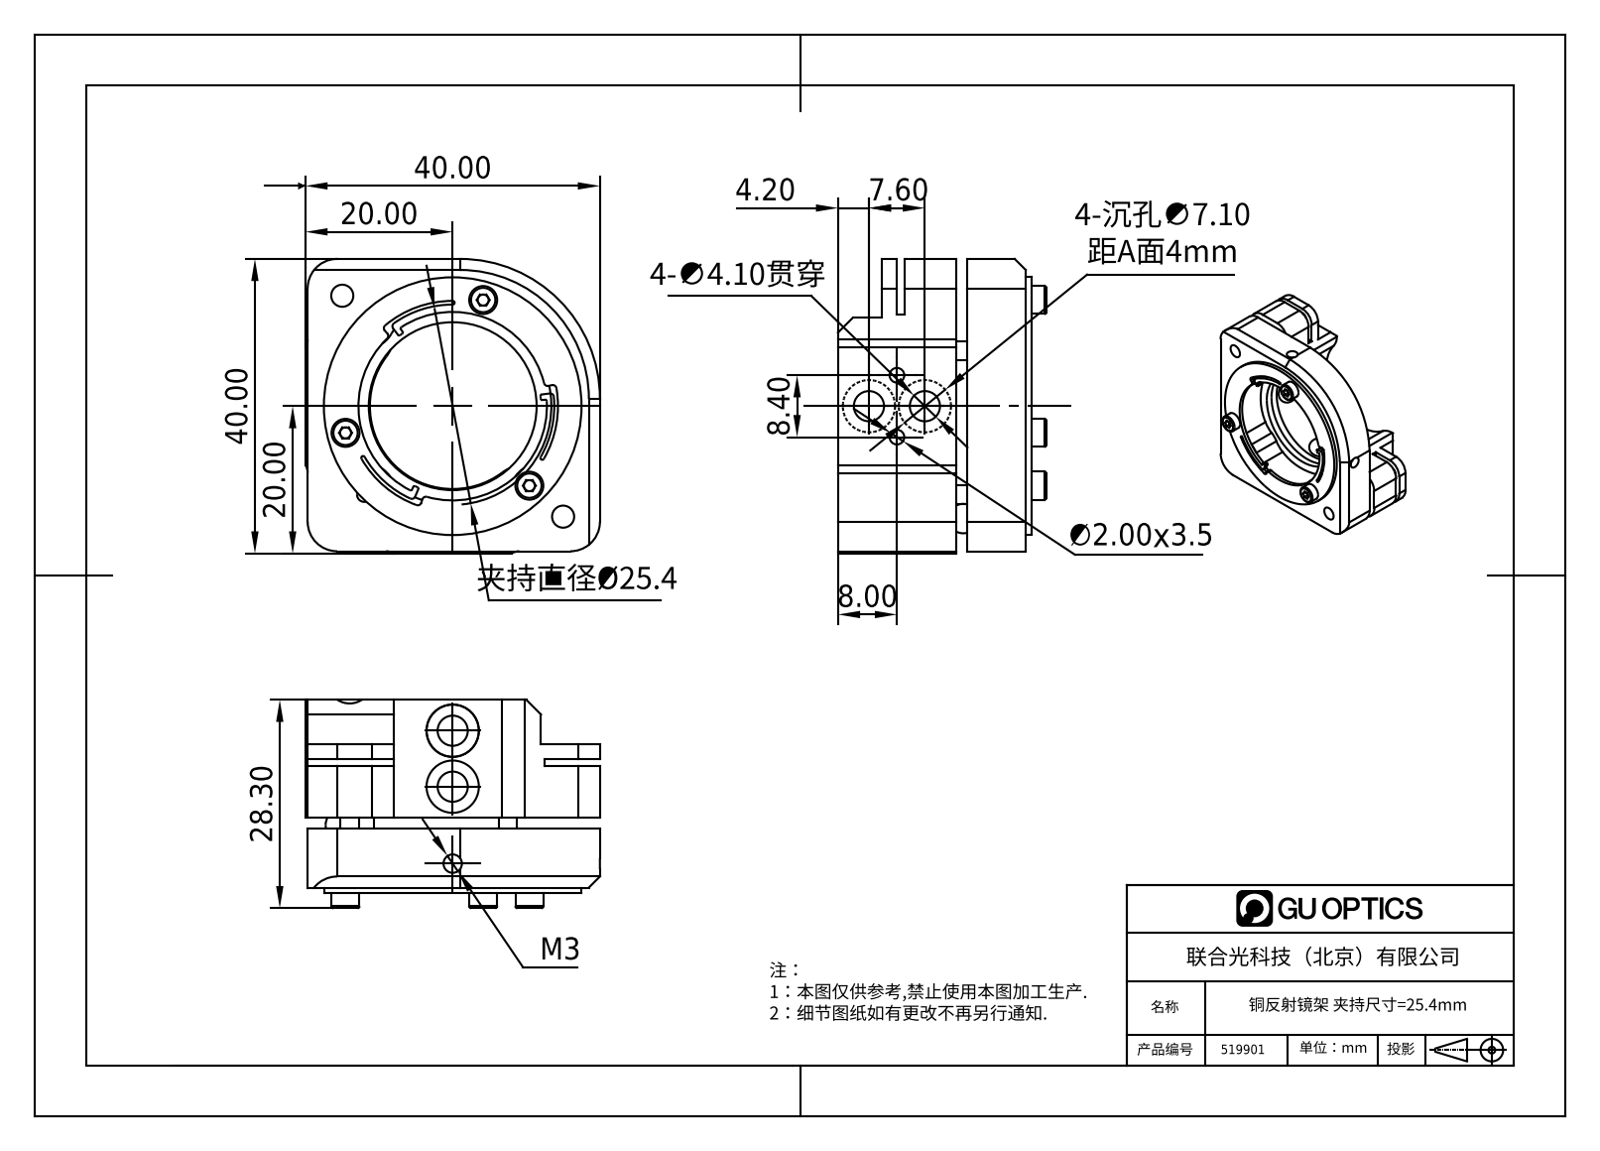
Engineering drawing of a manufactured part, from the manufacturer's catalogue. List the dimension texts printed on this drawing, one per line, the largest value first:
40.00
40.00
28.30
夹持直径Ø25.4
20.00
20.00
8.40
8.00
7.60
4.20
4-贯穿
4-沉孔距A面4mm
x3.5
M3
